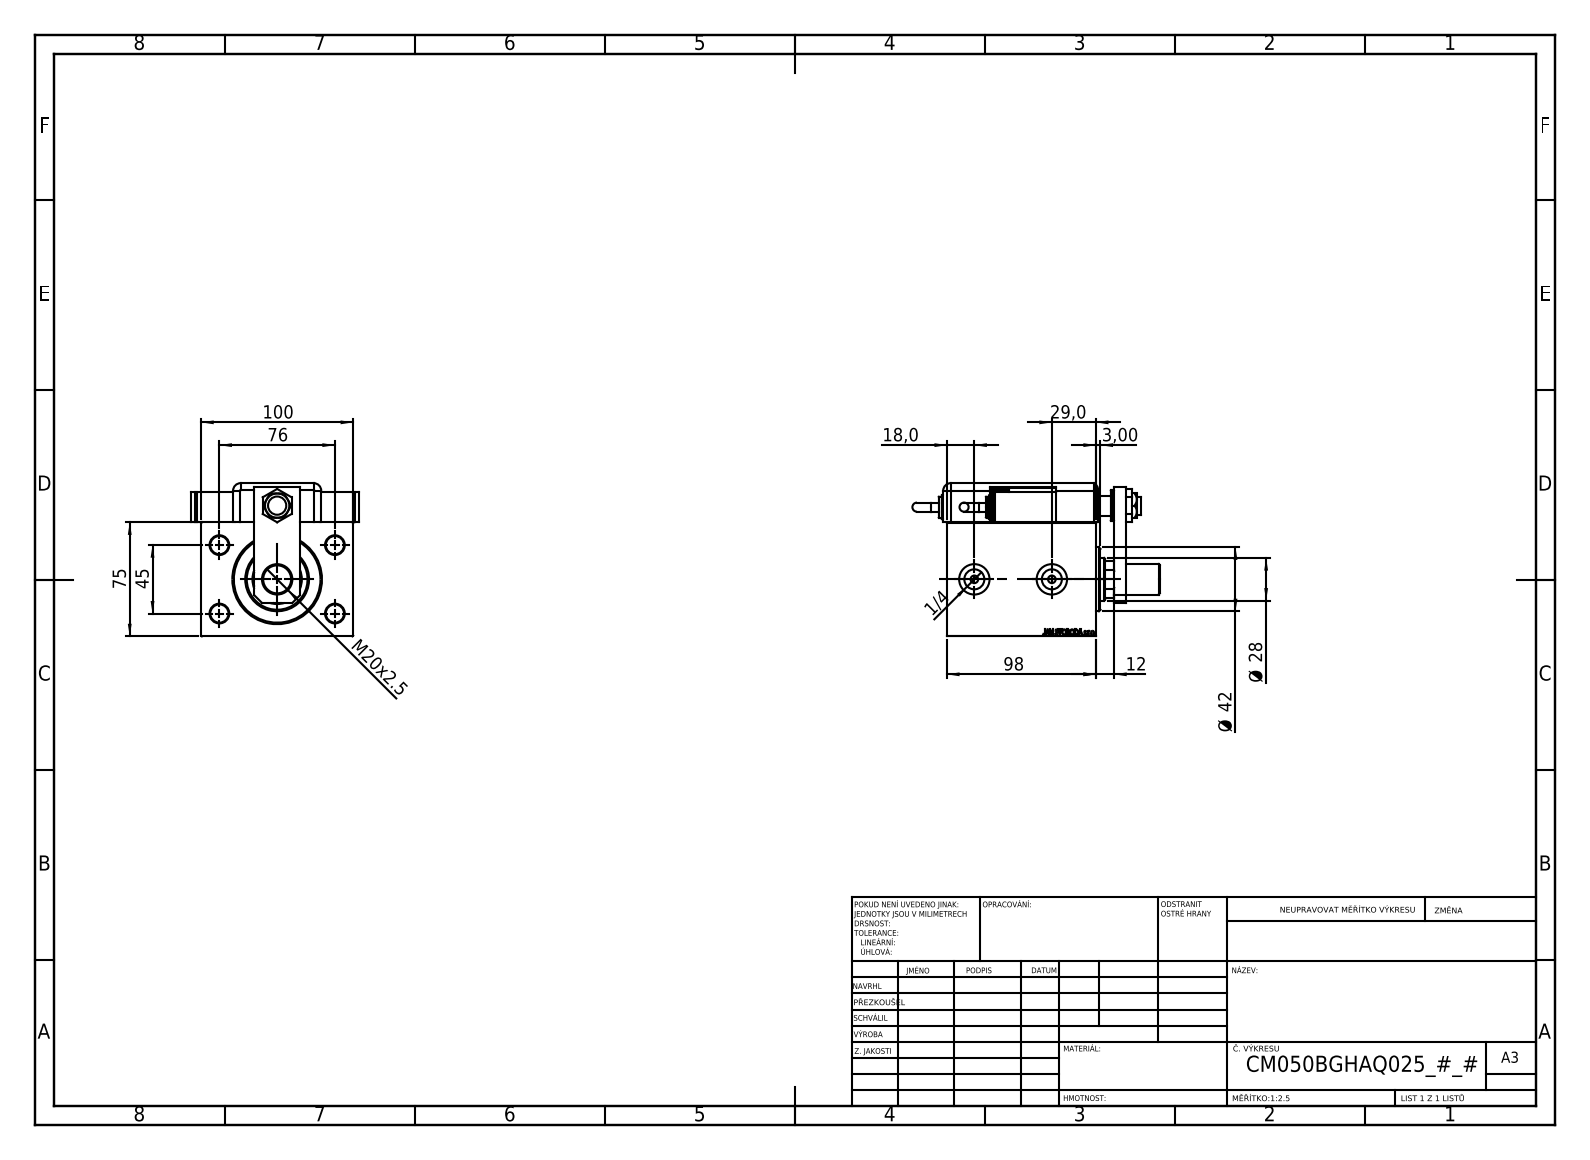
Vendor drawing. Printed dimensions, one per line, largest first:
100
98
76
75
45
Ø 42
29,0
Ø 28
M20x2.5
18,0
12
3,00
1/4
